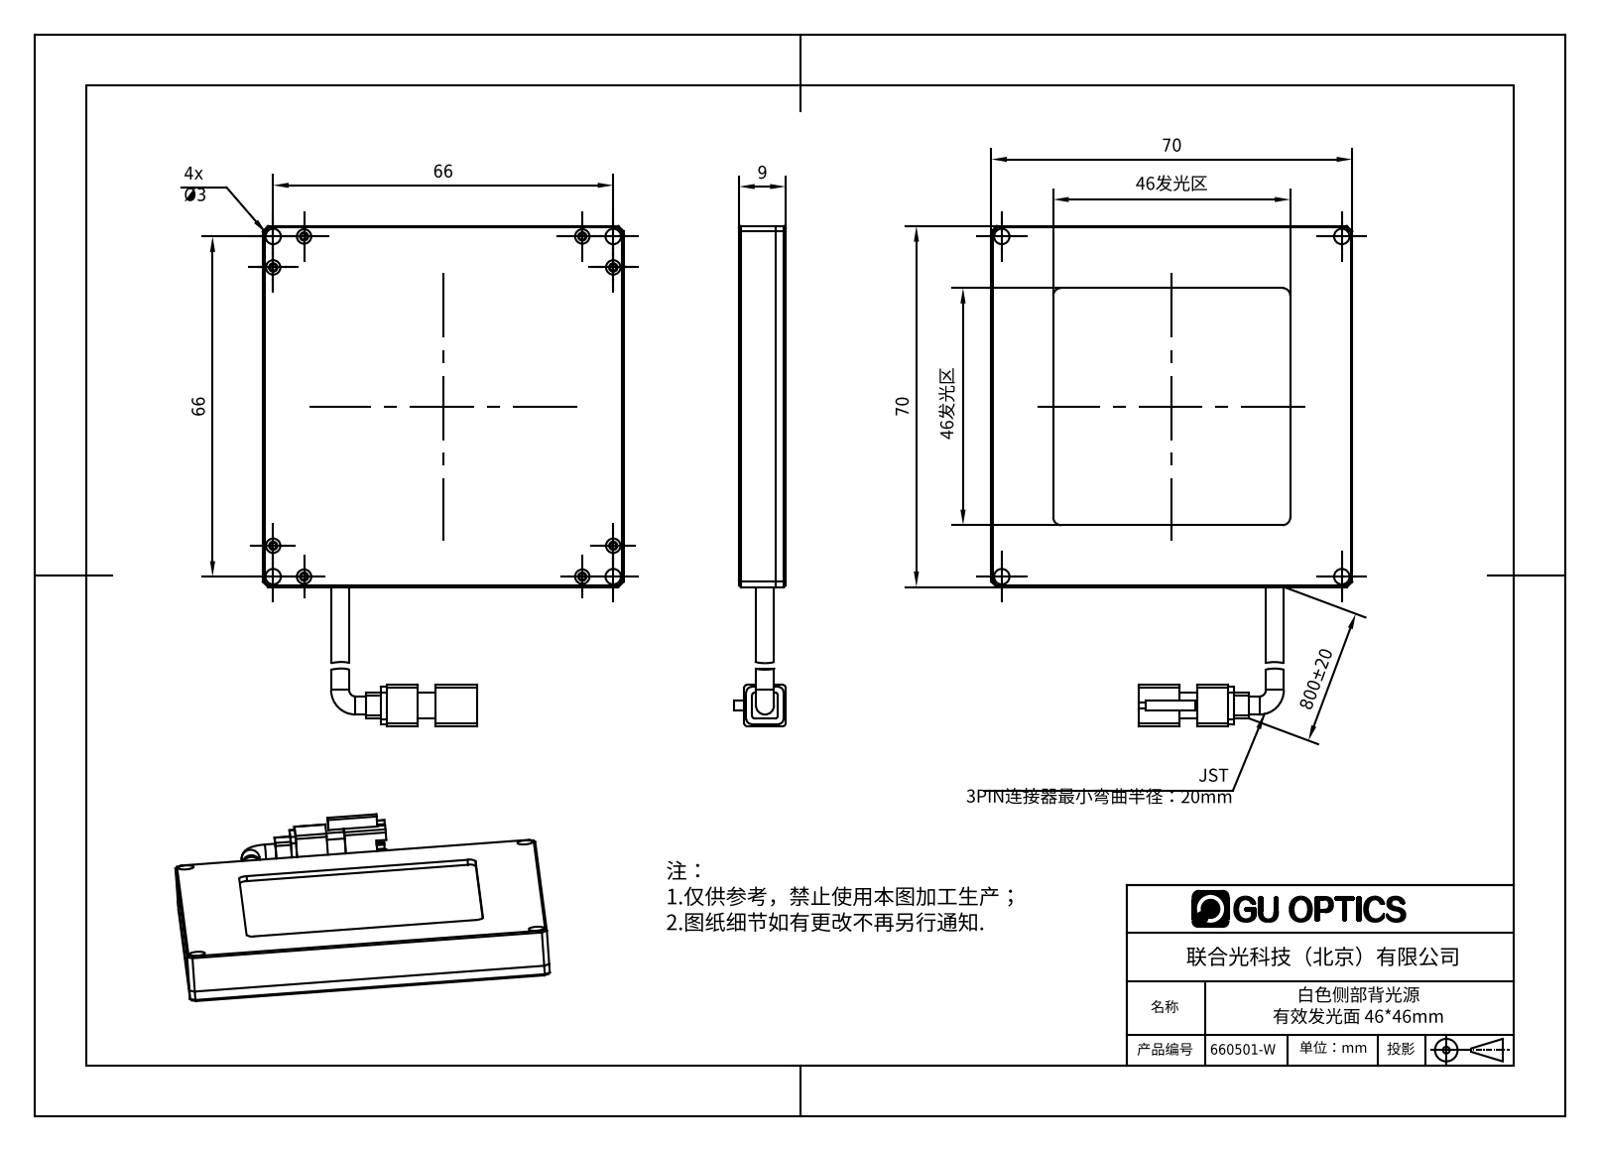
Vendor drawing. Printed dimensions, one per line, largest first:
800±20
70
70
66
66
46发光区
46发光区
9
